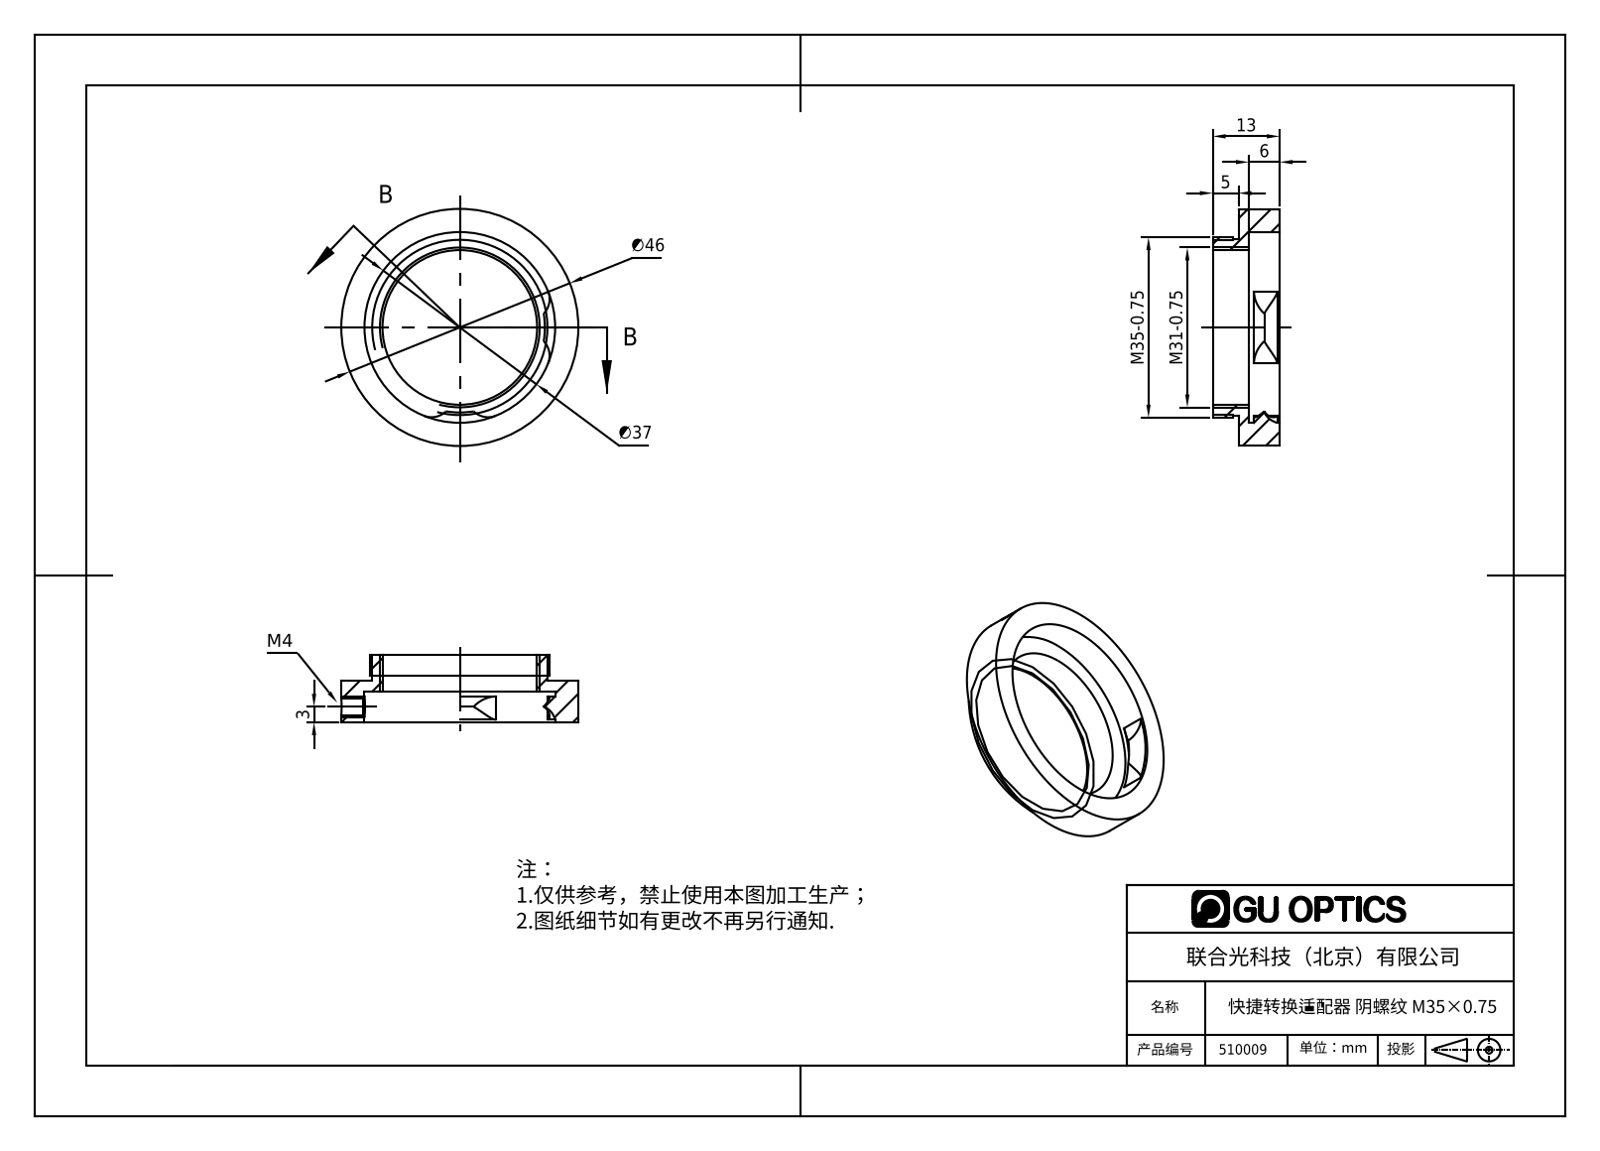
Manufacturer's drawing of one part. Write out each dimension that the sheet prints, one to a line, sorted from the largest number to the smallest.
∅46
∅37
M35-0.75
M31-0.75
13
6
5
3
